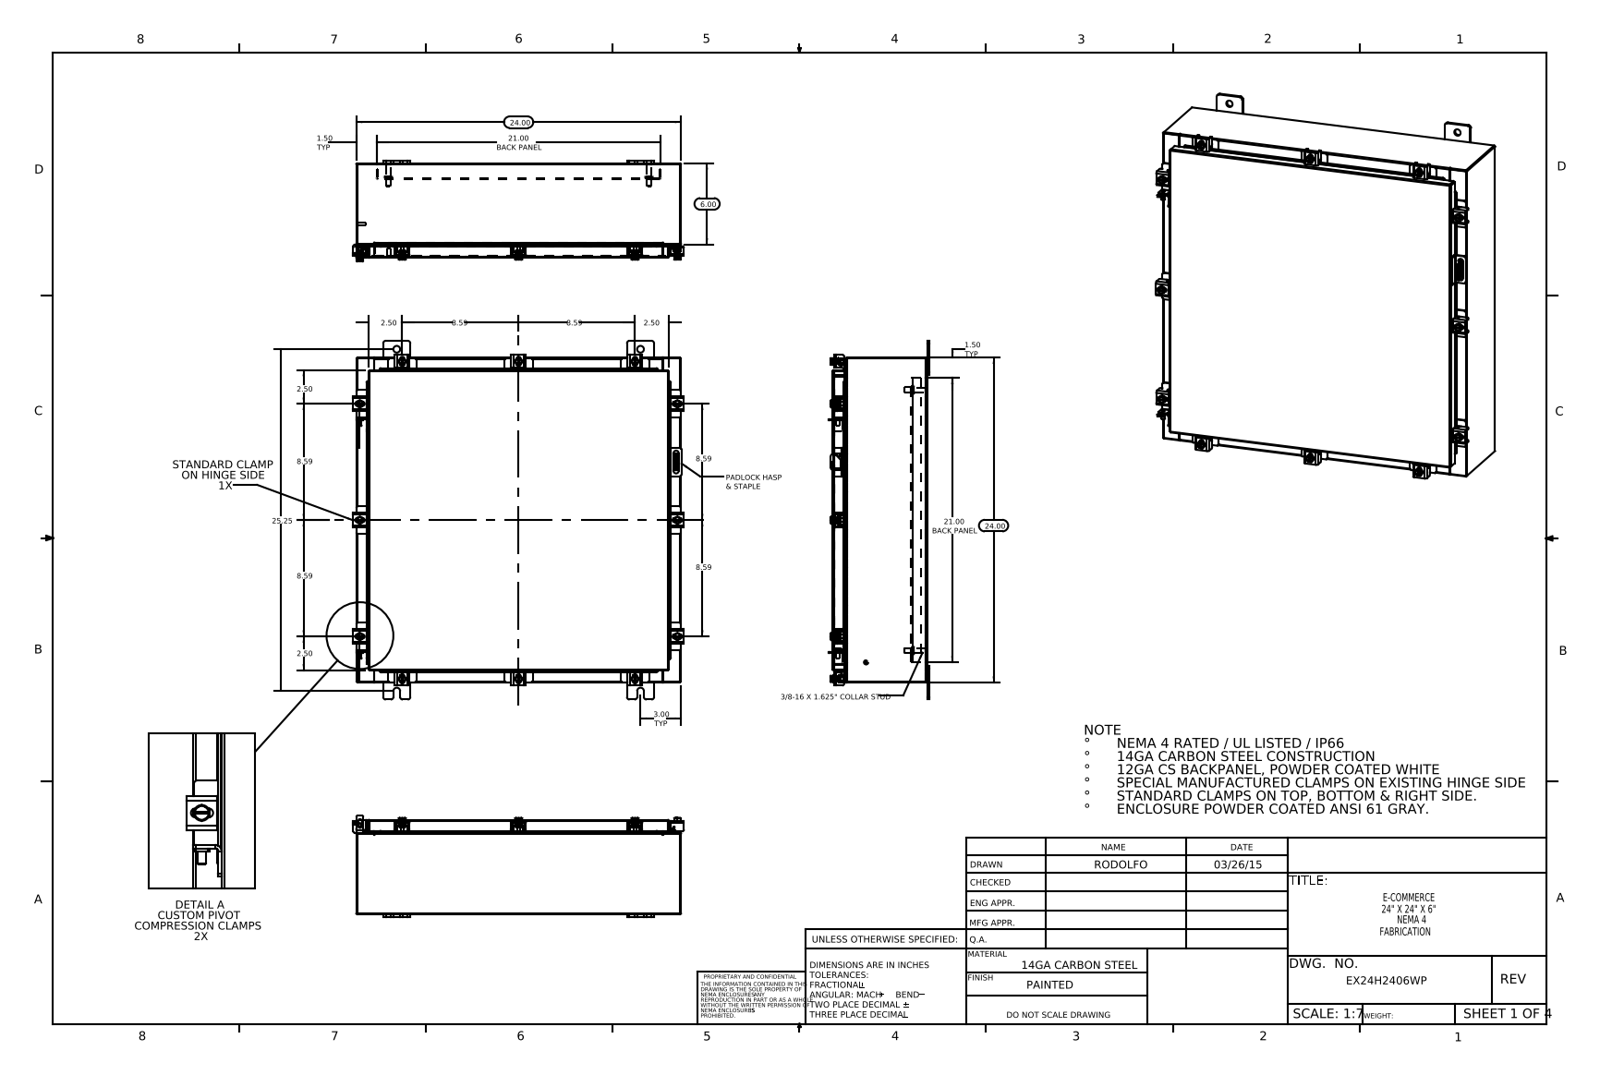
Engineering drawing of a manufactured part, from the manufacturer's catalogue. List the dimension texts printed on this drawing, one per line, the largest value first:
25.25
24.00
24.00
21.00 BACK PANEL
21.00 BACK PANEL
8.59
8.59
8.59
8.59
8.59
8.59
6.00
3.00 TYP
2.50
2.50
2.50
2.50
1.50 TYP
1.50 TYP
